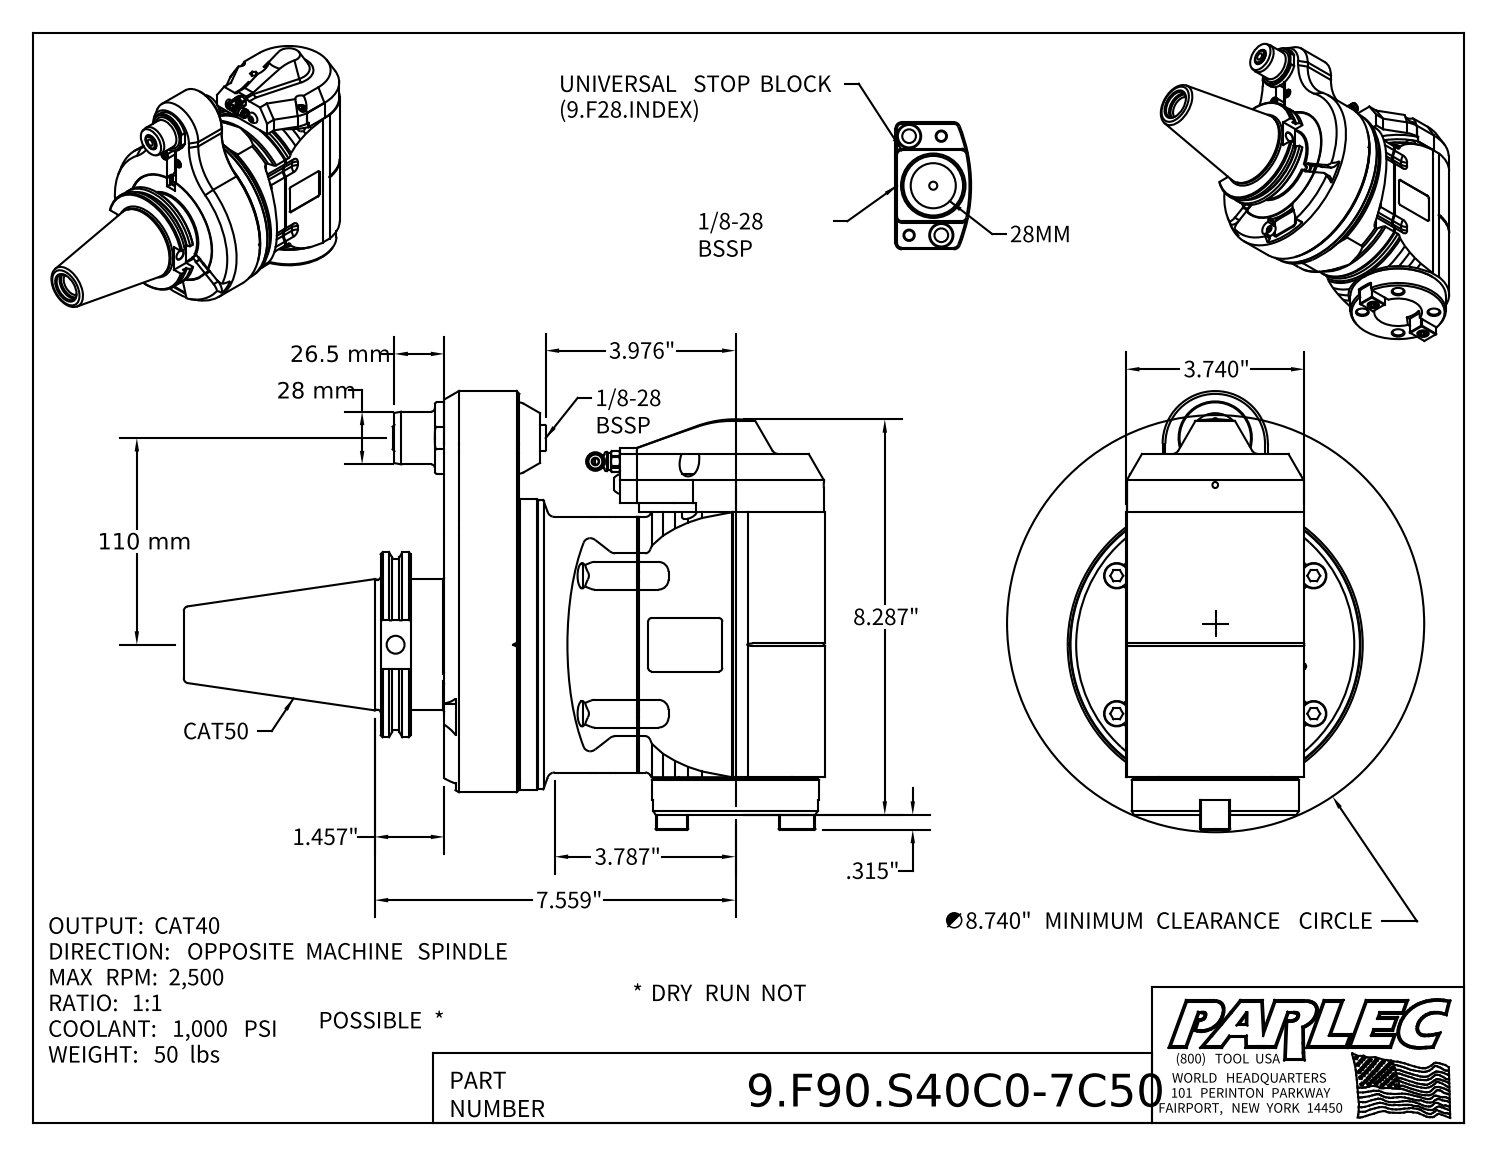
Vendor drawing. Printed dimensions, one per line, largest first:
110 mm
28 mm
26.5 mm
∅8.740" MINIMUM CLEARANCE CIRCLE
8.287"
7.559"
3.976"
3.787"
3.740"
1.457"
.315"
